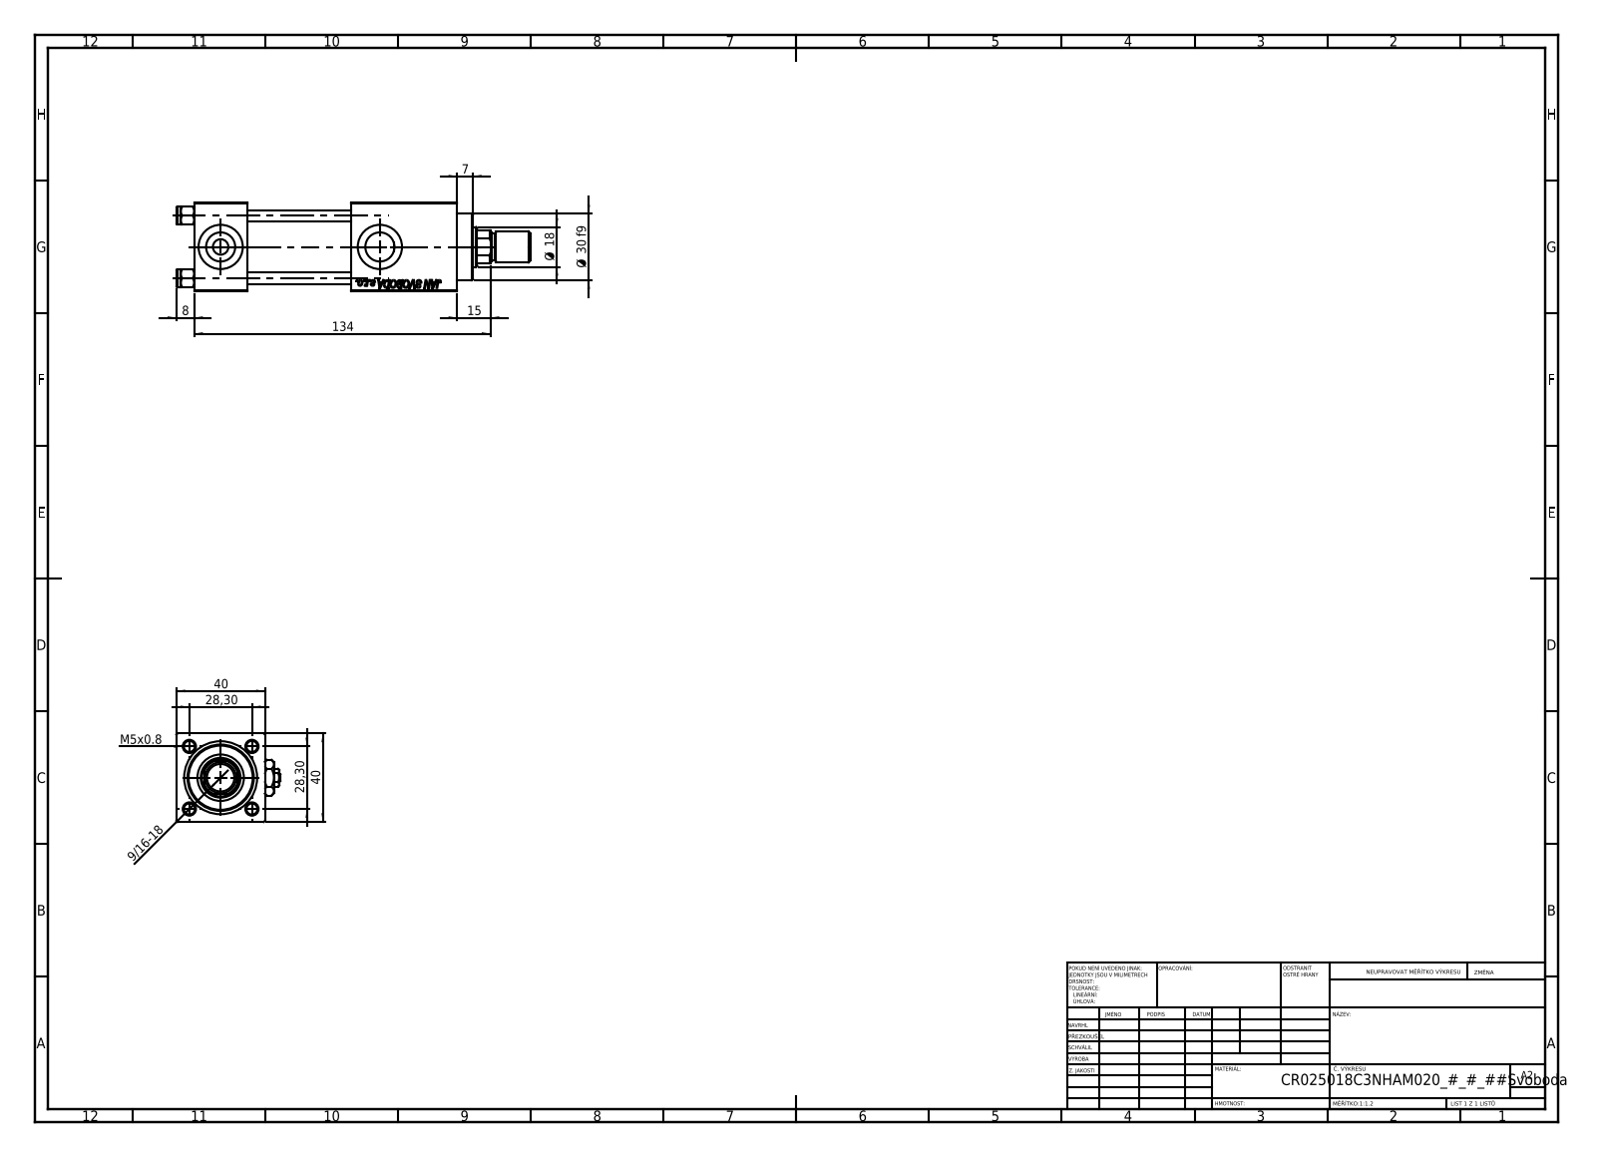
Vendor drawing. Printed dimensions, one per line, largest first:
134
40
40
Ø 30 f9
28,30
28,30
Ø 18
15
8
7
M5x0.8
9/16-18
